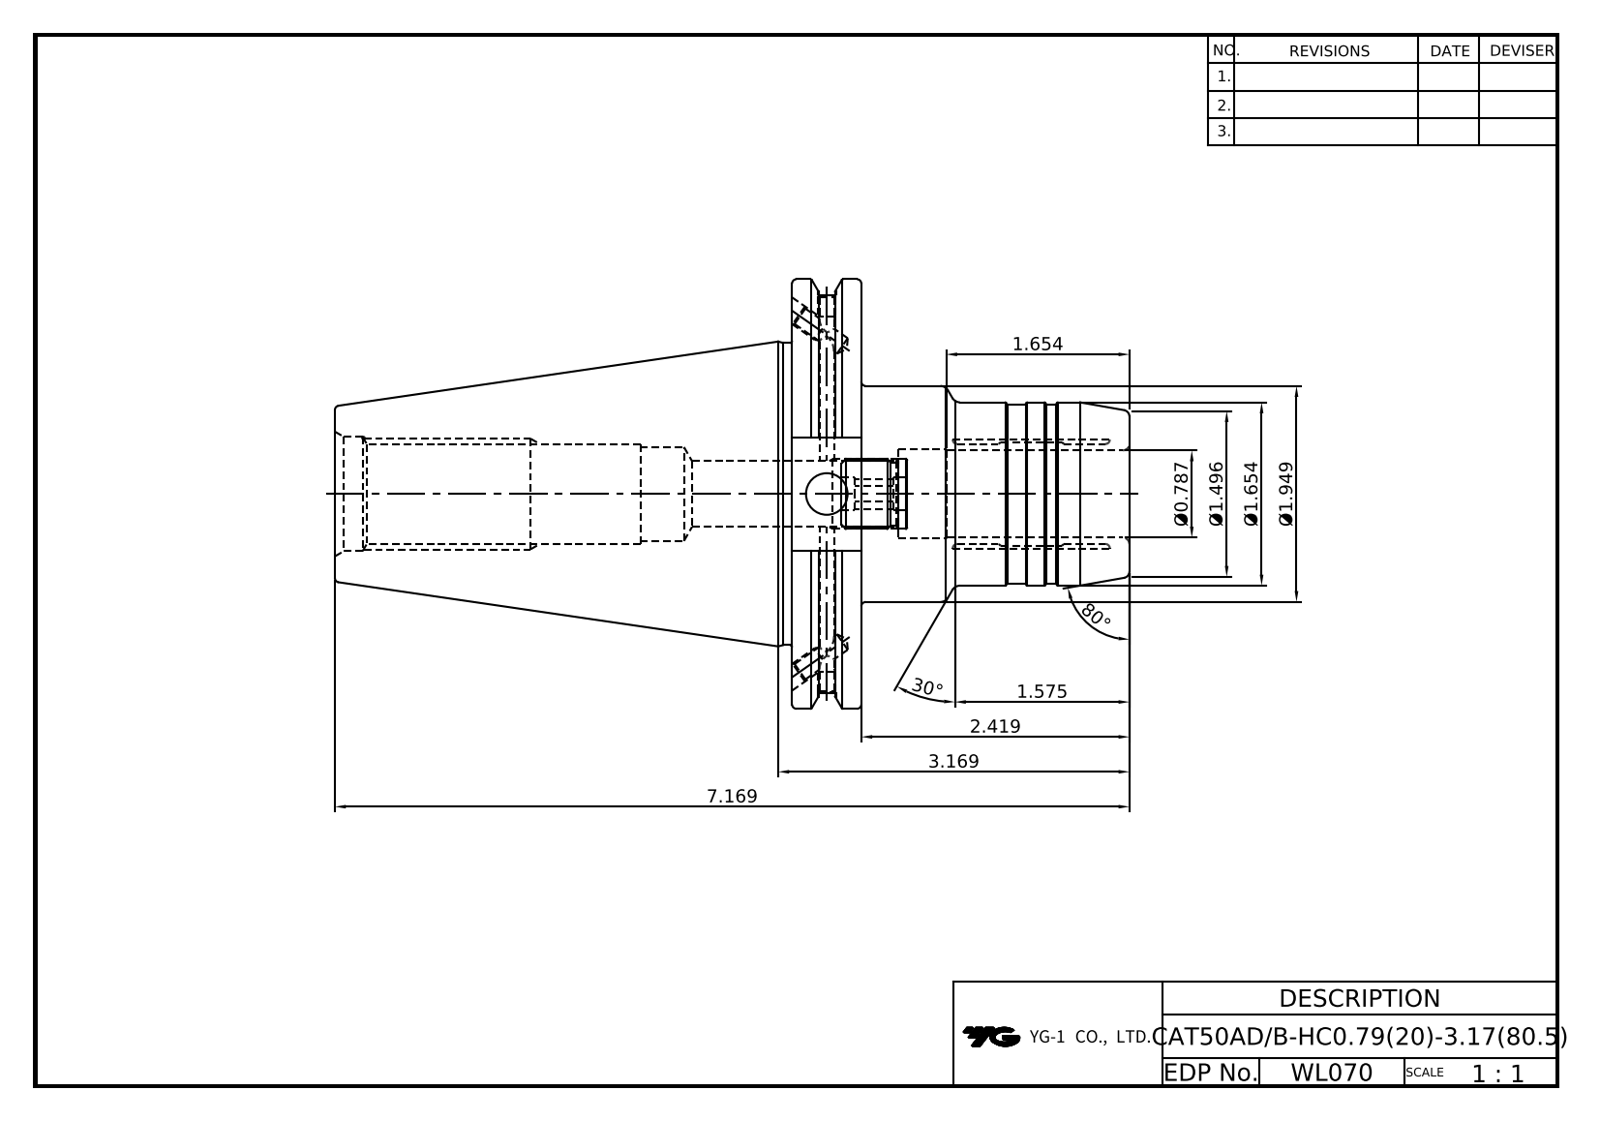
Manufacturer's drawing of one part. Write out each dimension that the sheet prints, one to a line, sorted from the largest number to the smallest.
80°
30°
7.169
3.169
2.419
Ø1.949
Ø1.654
1.654
1.575
Ø1.496
Ø0.787
